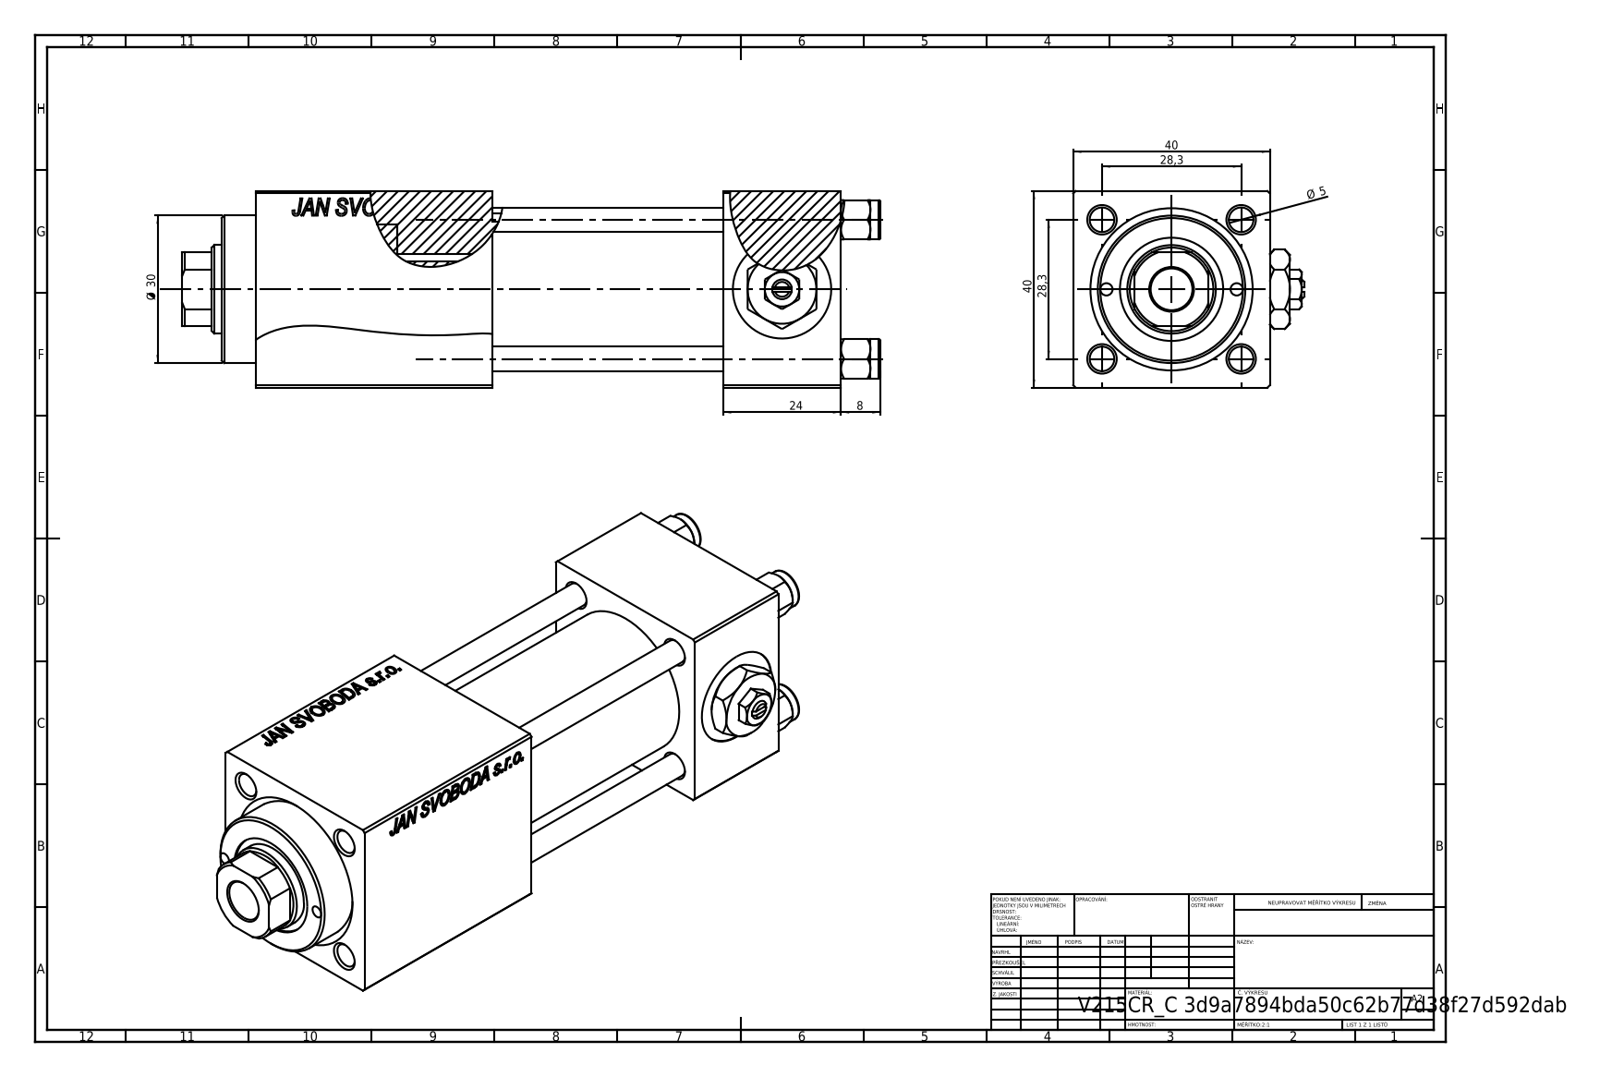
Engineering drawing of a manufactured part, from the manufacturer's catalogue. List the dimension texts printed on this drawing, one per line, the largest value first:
40
40
Ø 30
28,3
28,3
24
8
Ø 5
